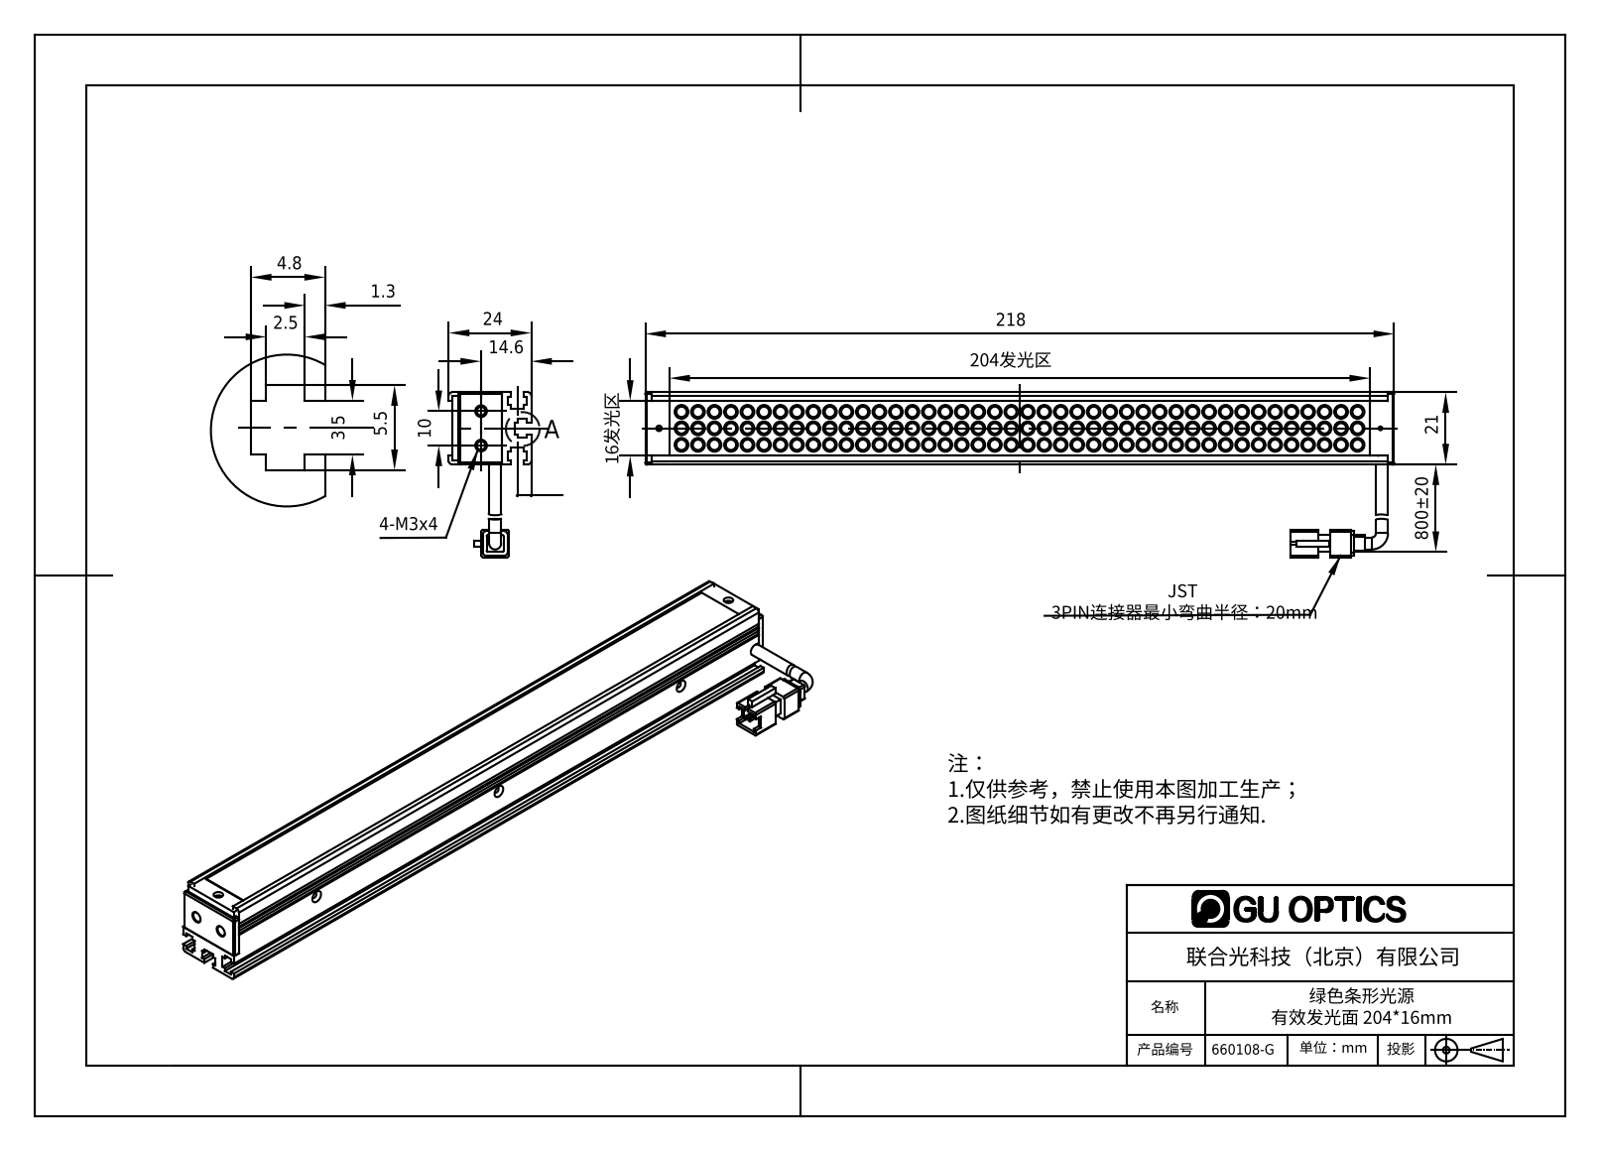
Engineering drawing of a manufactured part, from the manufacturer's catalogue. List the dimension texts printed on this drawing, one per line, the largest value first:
800±20
218
204发光区
24
21
16发光区
14.6
10
5.5
4.8
3.5
3
2.5
1.3
